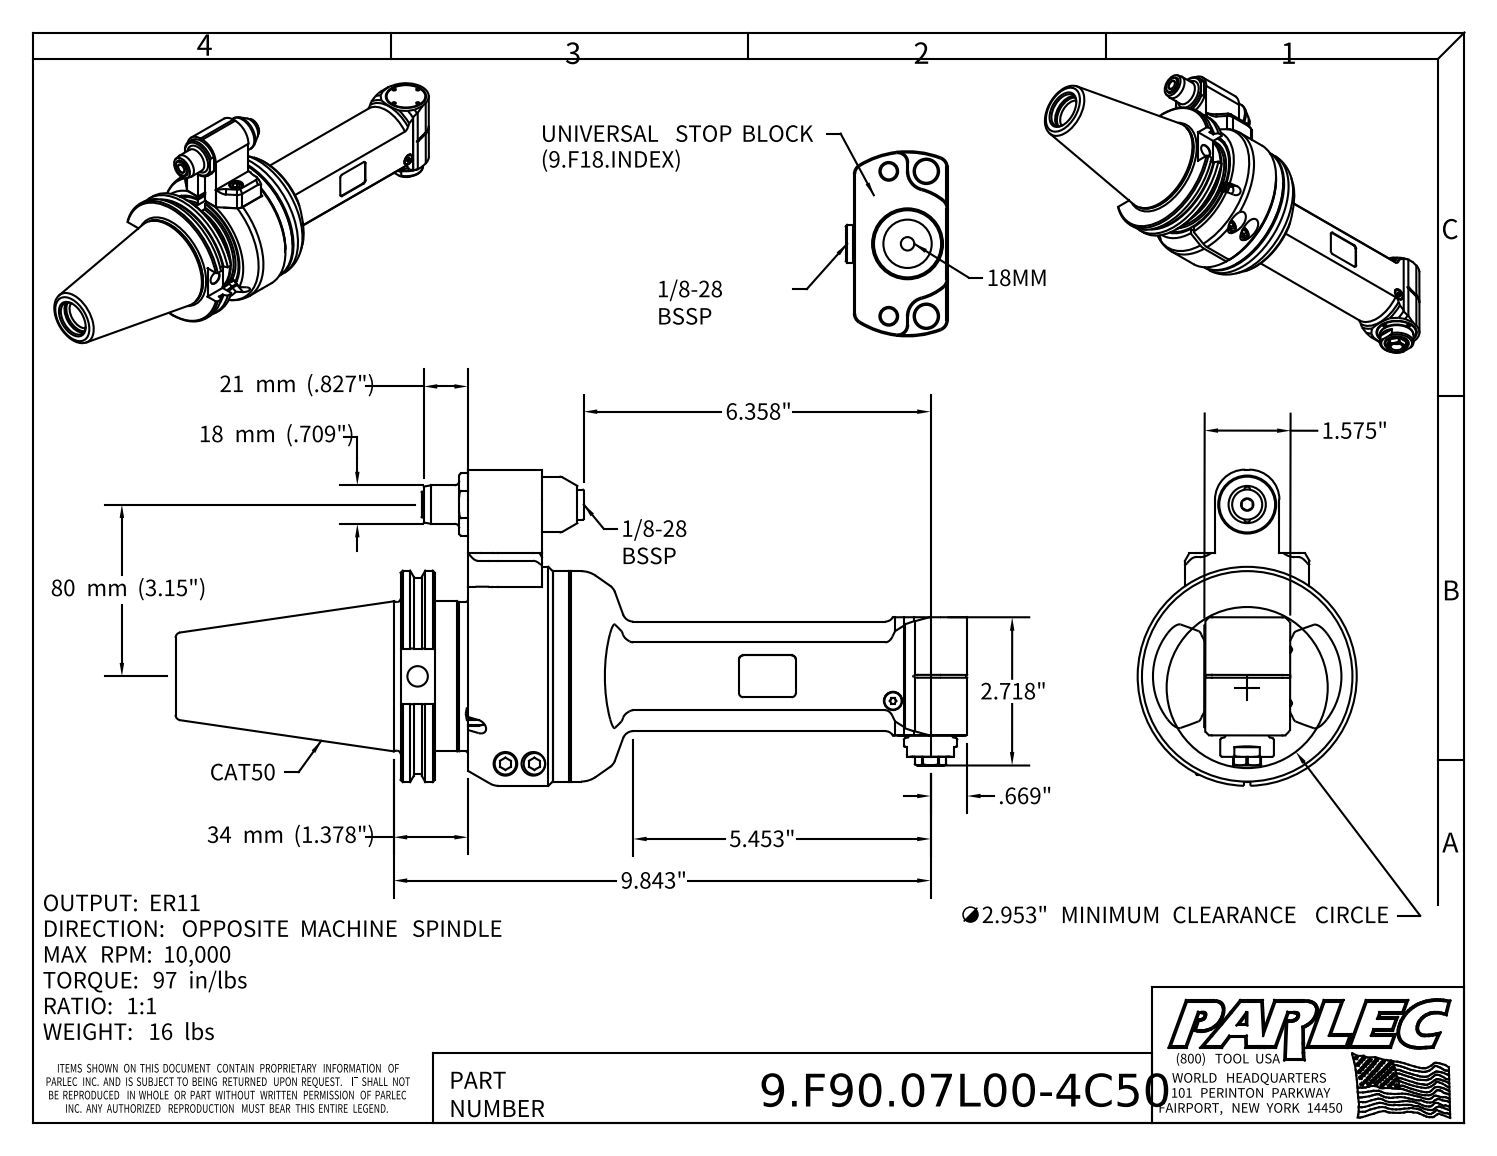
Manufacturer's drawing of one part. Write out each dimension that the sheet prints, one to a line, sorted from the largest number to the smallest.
80 mm (3.15")
34 mm (1.378")
21 mm (.827")
18 mm (.709")
9.843"
6.358"
5.453"
∅2.953" MINIMUM CLEARANCE CIRCLE
2.718"
1.575"
.669"
